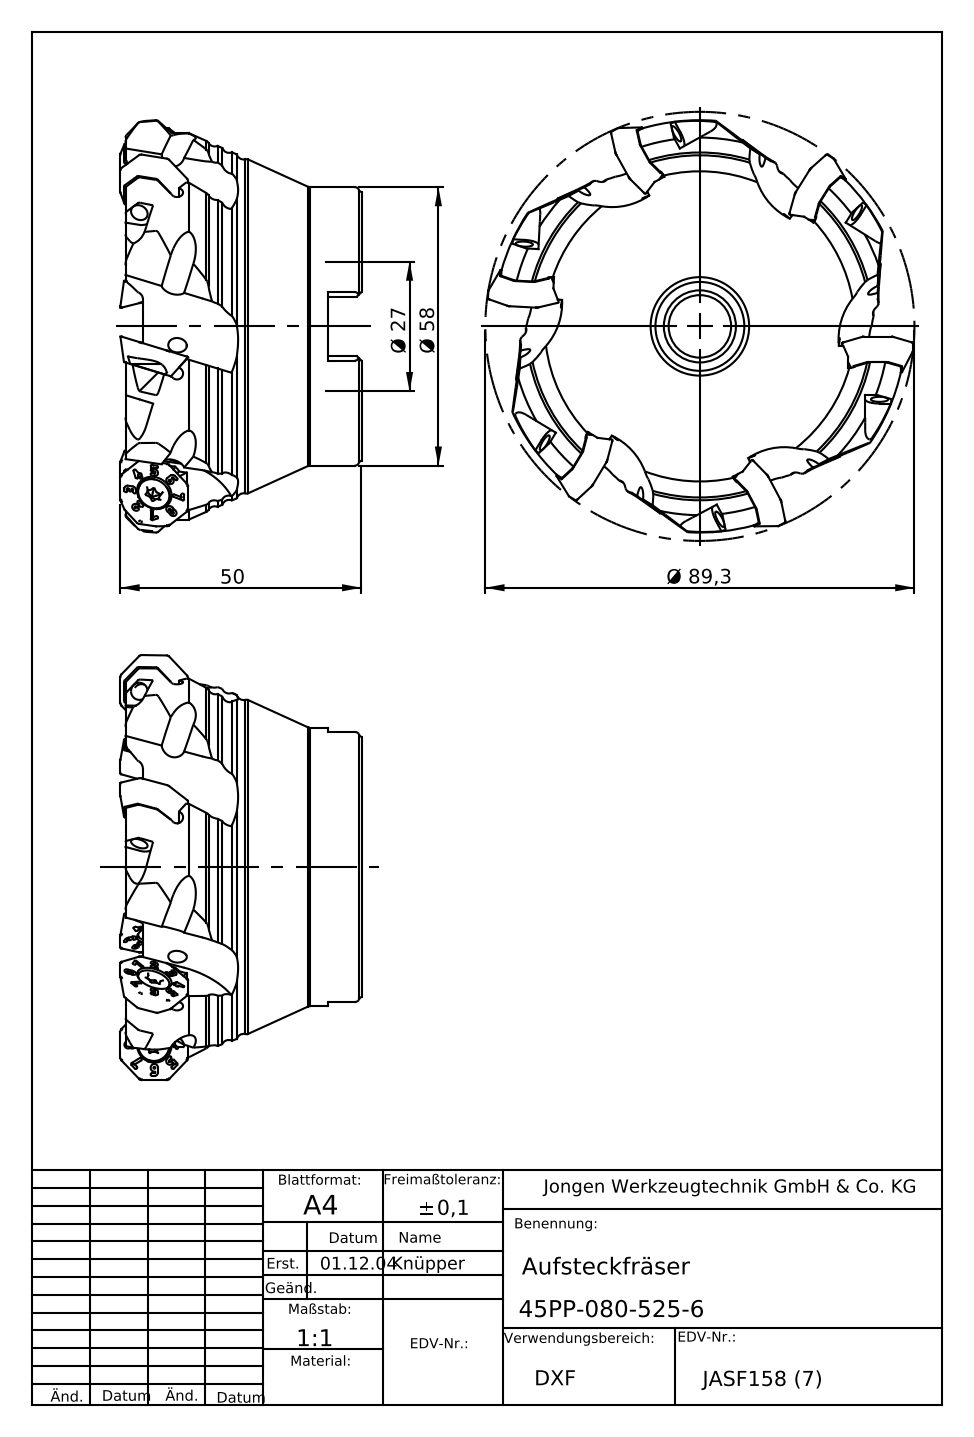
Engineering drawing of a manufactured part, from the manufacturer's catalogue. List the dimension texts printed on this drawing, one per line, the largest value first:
Ø 89,3
Ø 58
50
Ø 27
